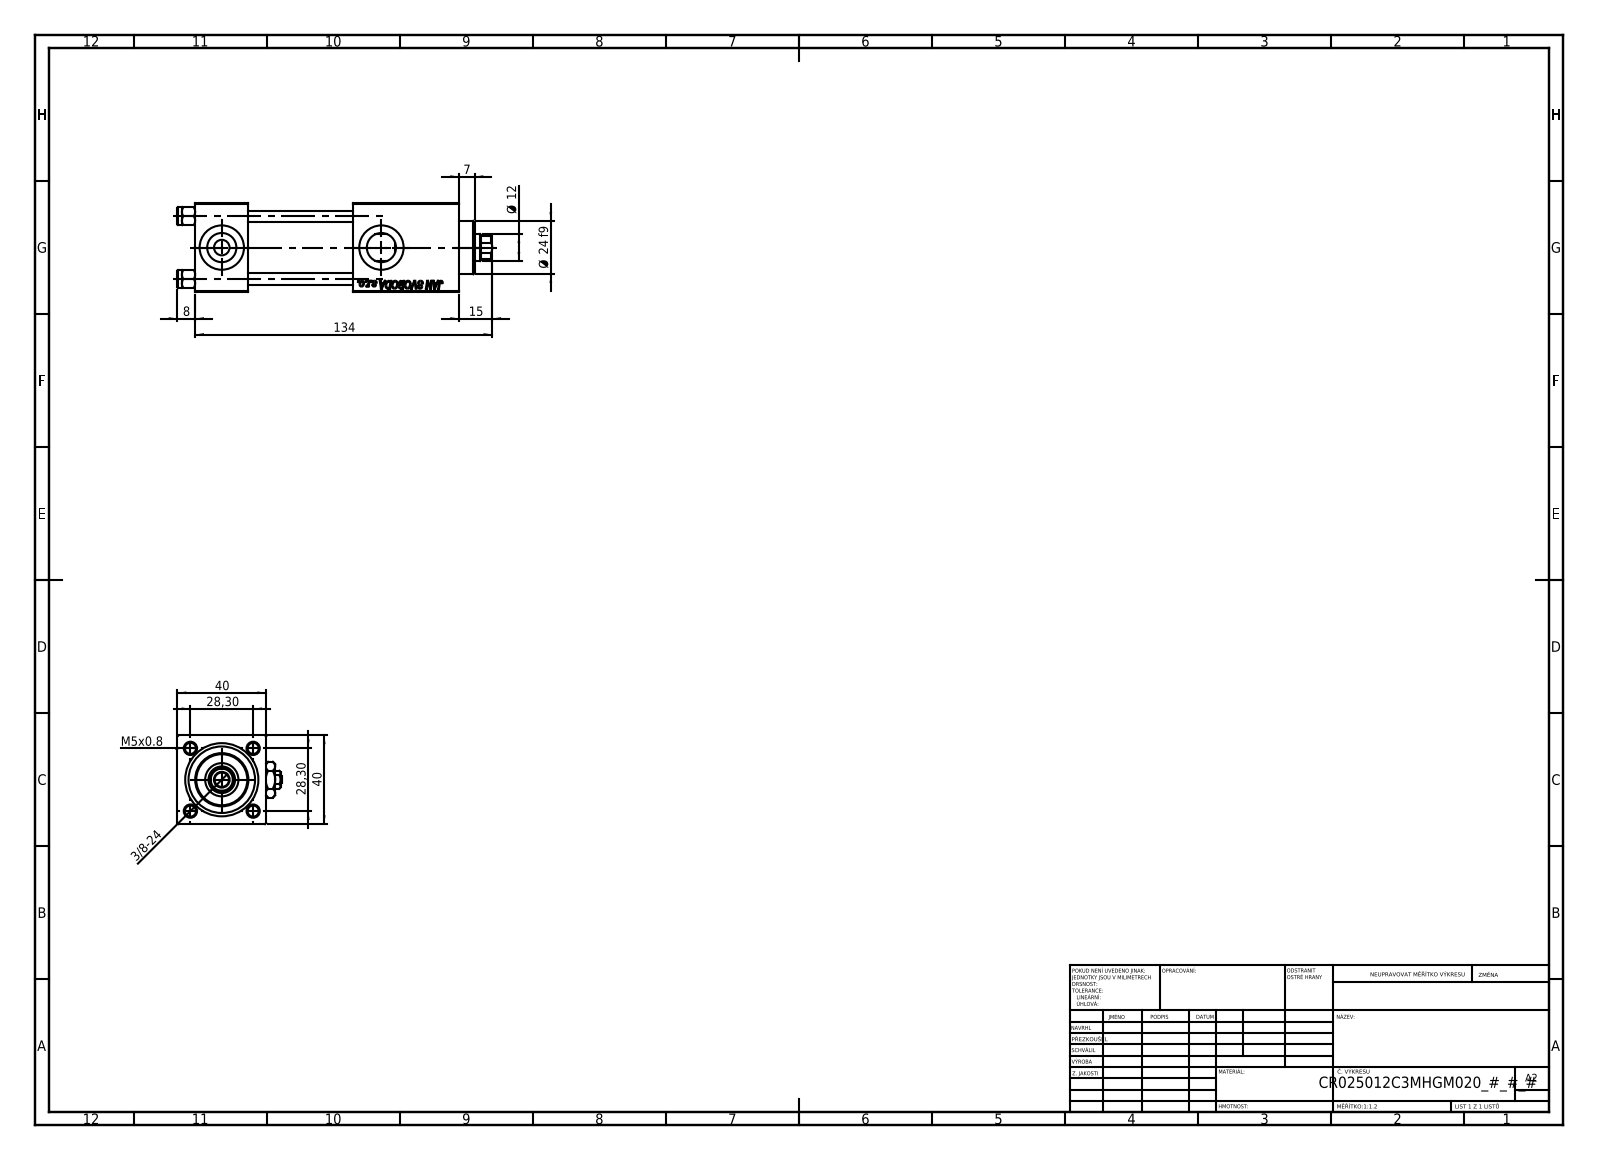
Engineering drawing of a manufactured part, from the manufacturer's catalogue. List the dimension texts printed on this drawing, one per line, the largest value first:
134
40
40
28,30
28,30
Ø 24 f9
15
Ø 12
8
7
M5x0.8
3/8-24
